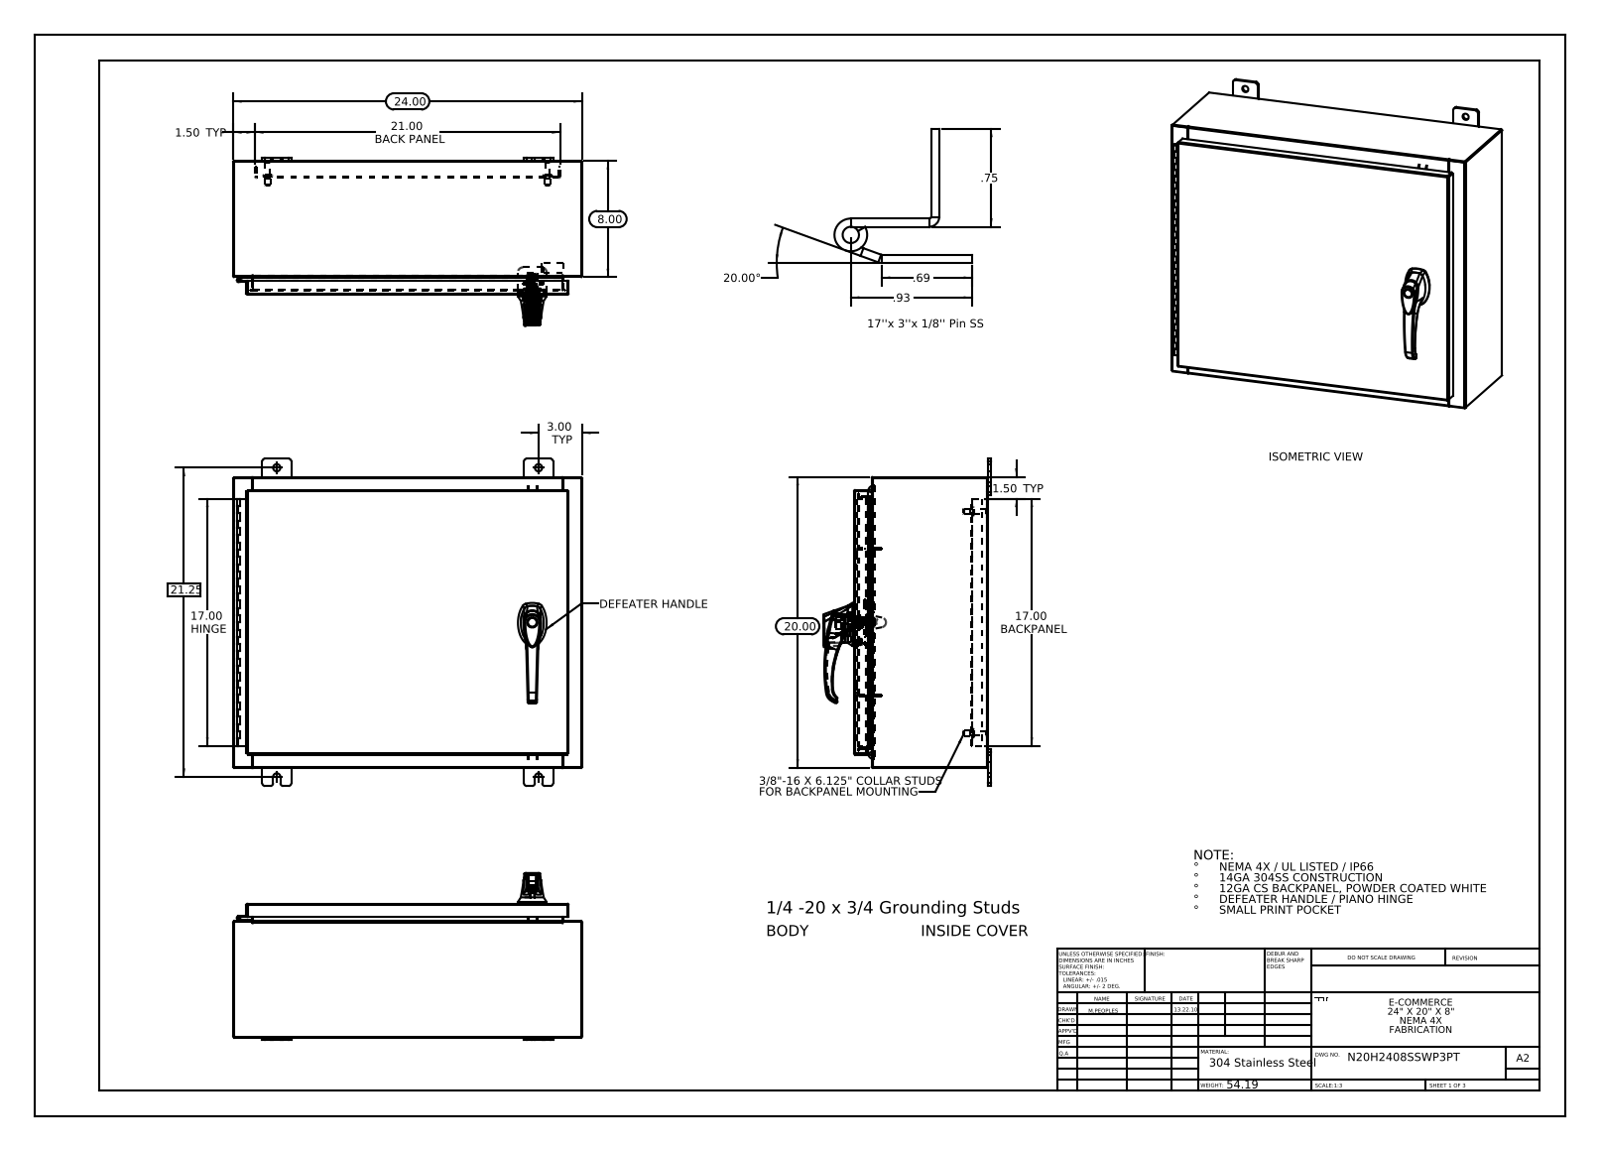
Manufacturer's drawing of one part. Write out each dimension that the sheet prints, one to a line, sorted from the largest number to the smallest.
24.00
21.25
21.00 BACK PANEL
20.00
20.00°
17.00 HINGE
17.00 BACKPANEL
8.00
3.00 TYP
1.50 TYP
1.50 TYP
.93
.75
.69
